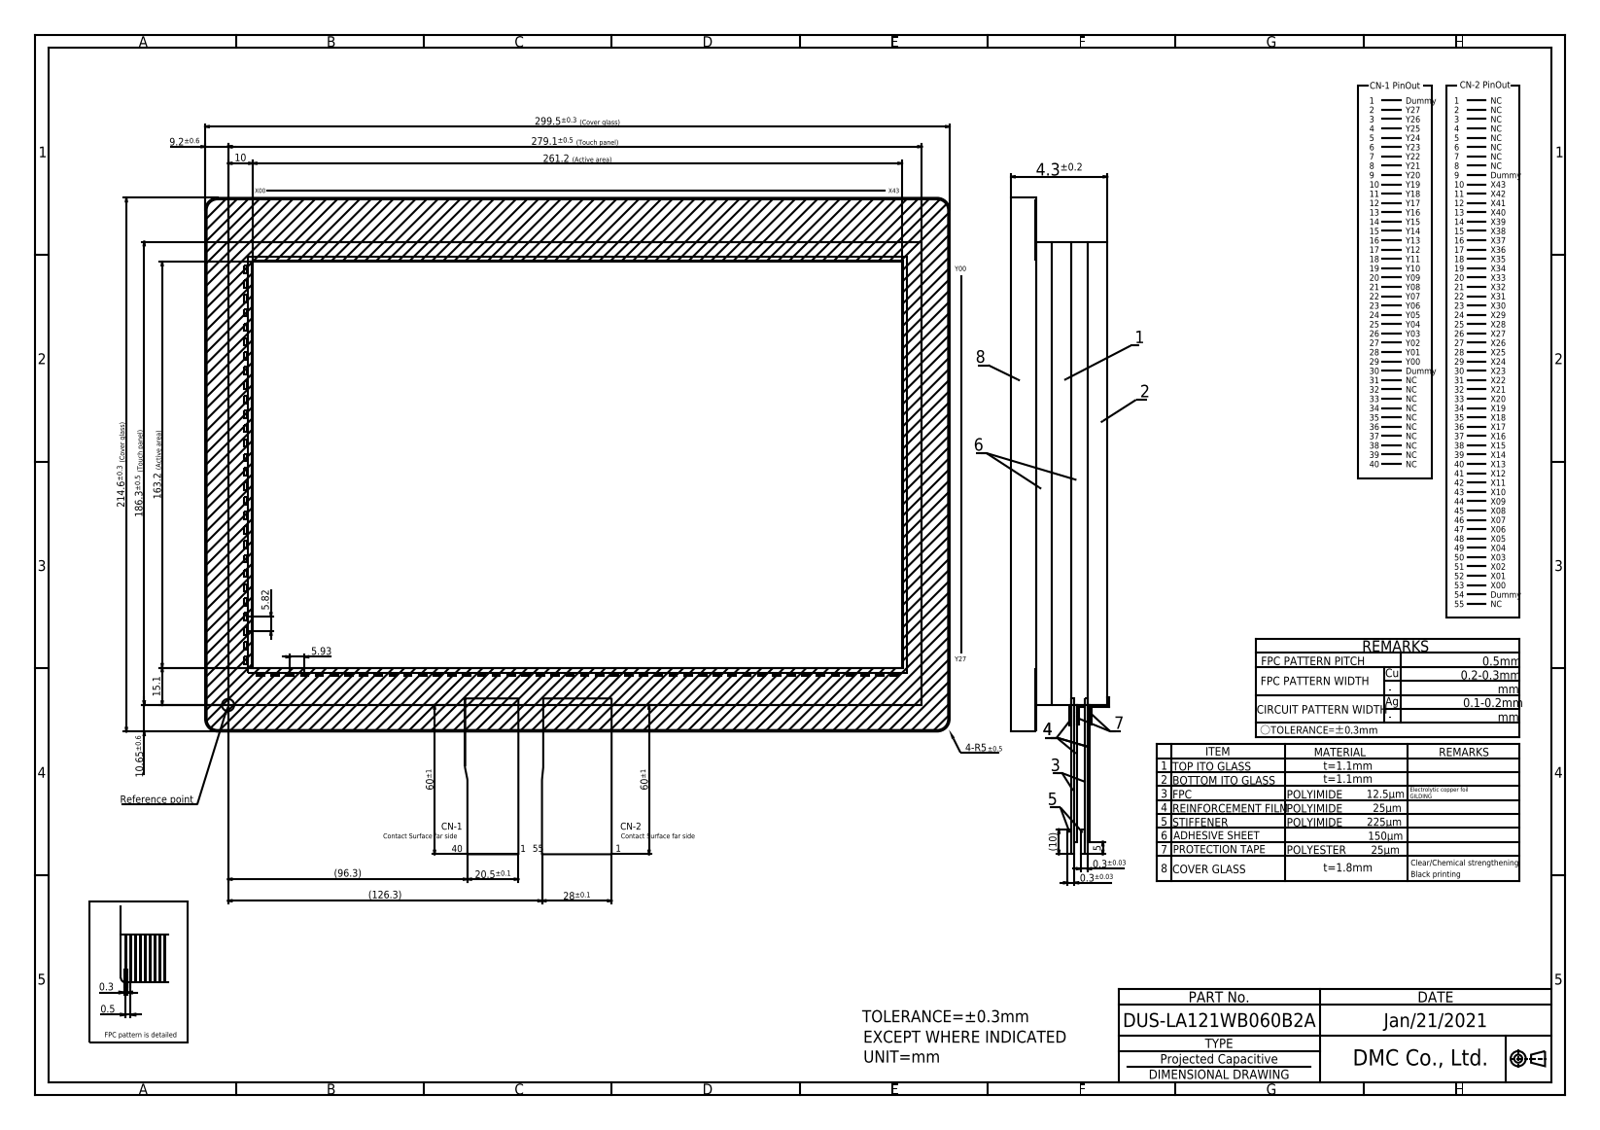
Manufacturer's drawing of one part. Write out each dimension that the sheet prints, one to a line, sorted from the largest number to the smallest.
299.5±0.3 (Cover glass)
279.1±0.5 (Touch panel)
261.2 (Active area)
214.6±0.3 (Cover glass)
186.3±0.5 (Touch panel)
163.2 (Active area)
(126.3)
(96.3)
60±1
60±1
28±0.1
20.5±0.1
15.1
10.65±0.6
10
(10)
9.2±0.6
5.93
5.82
5
4.3±0.2
0.5
0.3
0.3±0.03
0.3±0.03
